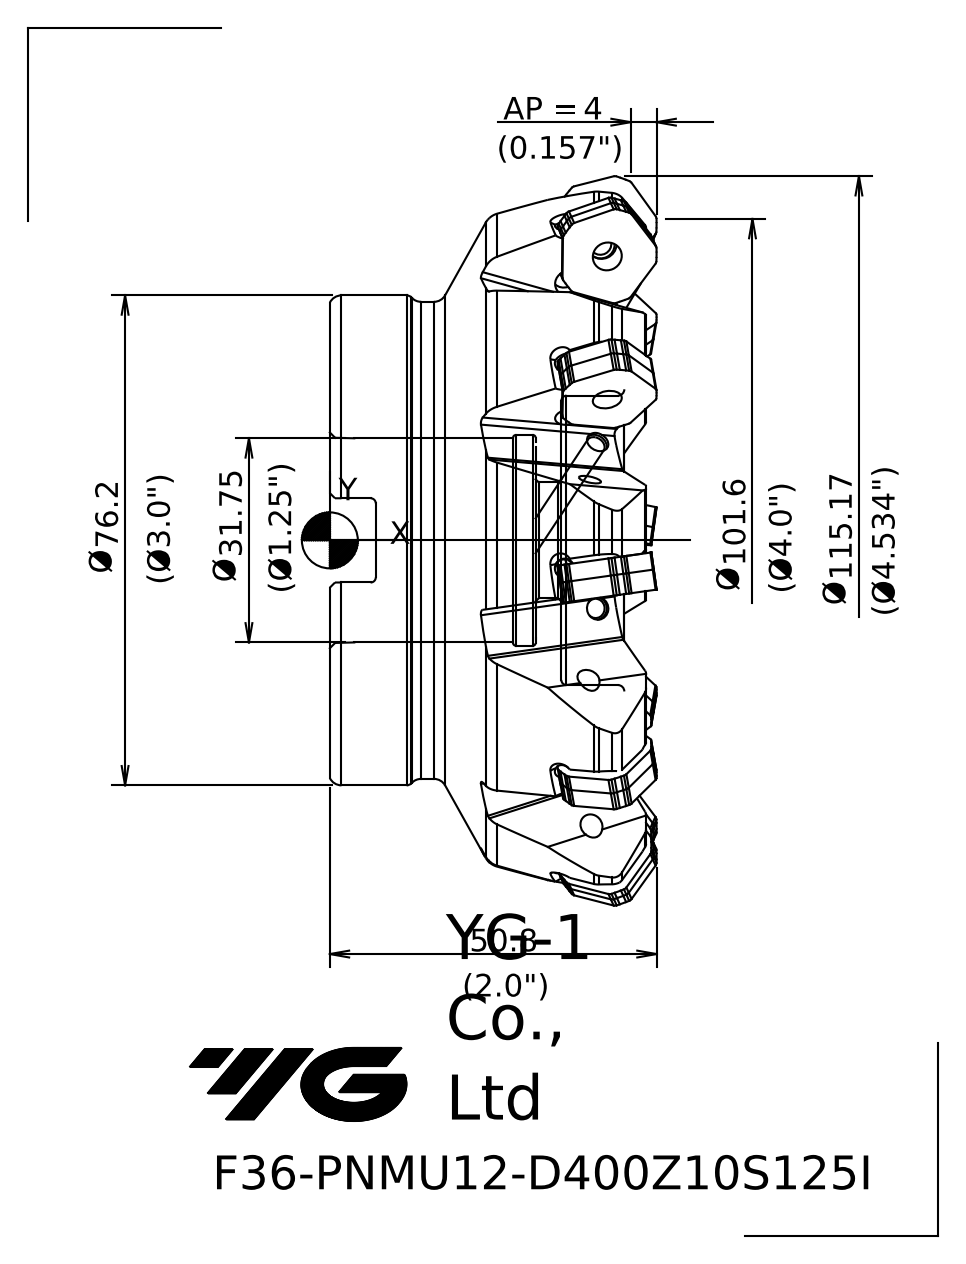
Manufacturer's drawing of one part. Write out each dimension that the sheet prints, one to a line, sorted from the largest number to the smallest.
101.6 Ø
76.2 Ø
31.75 Ø
